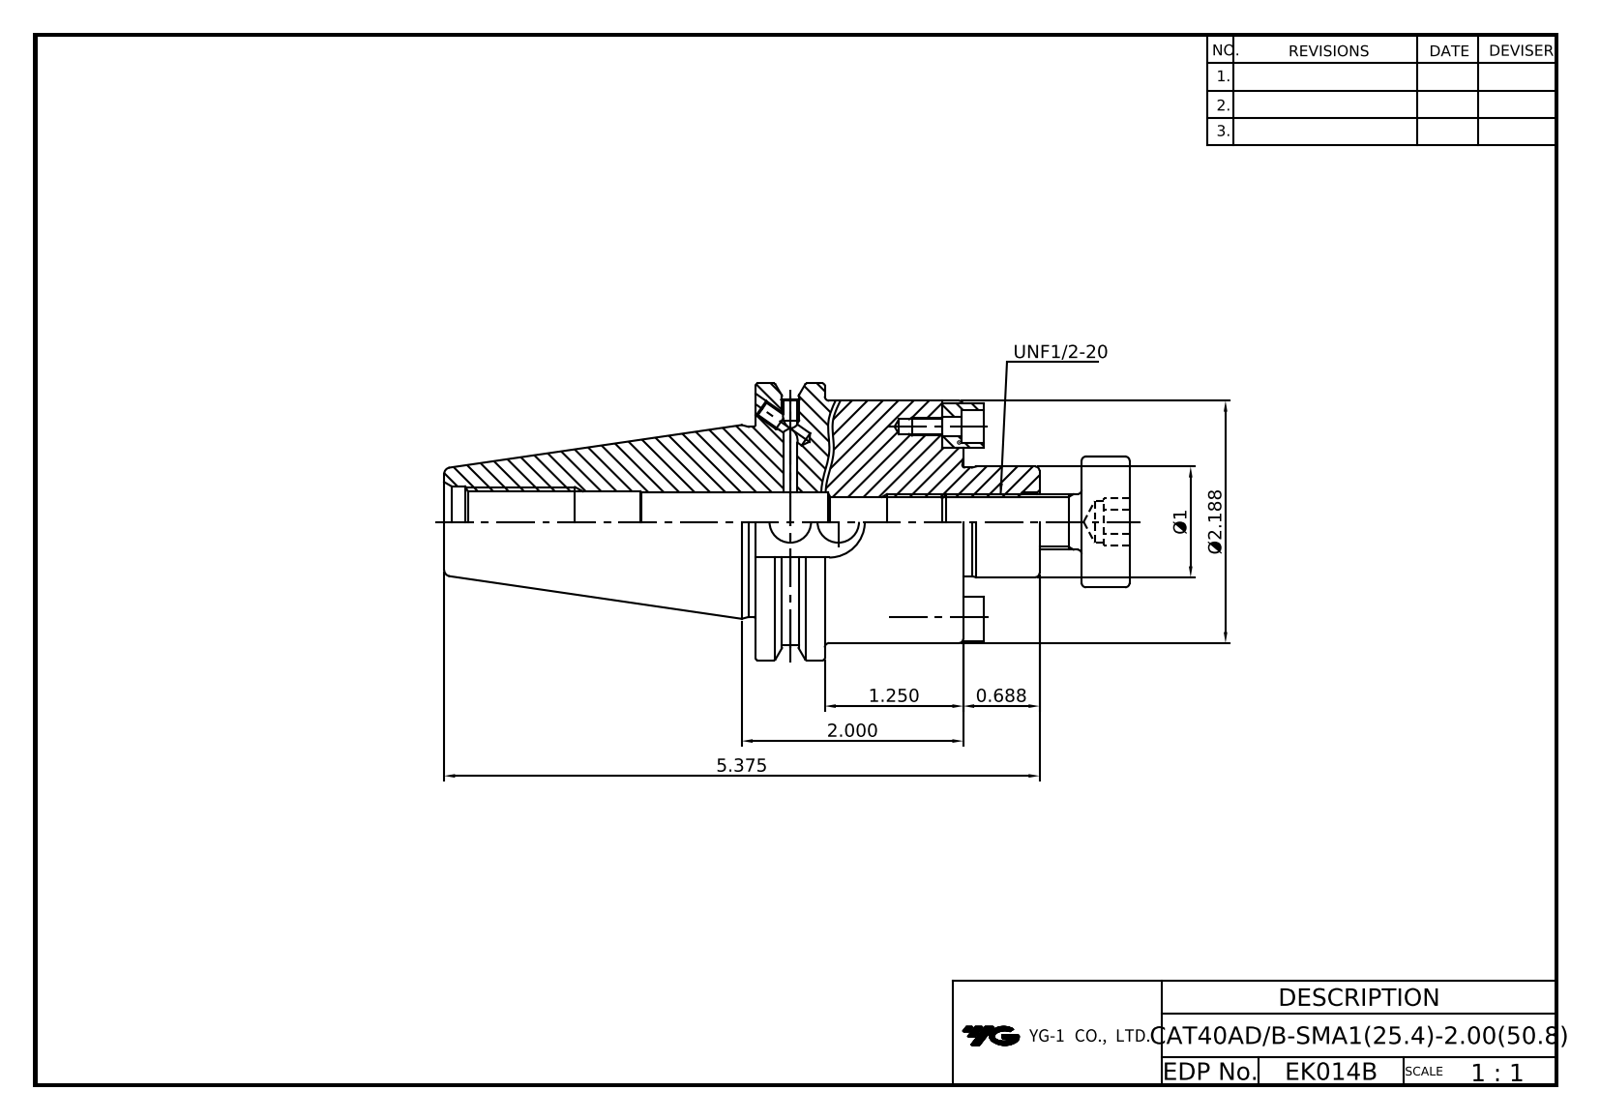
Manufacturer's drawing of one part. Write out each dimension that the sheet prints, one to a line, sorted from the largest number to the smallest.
5.375
Ø2.188
2.000
1.250
Ø1
0.688
